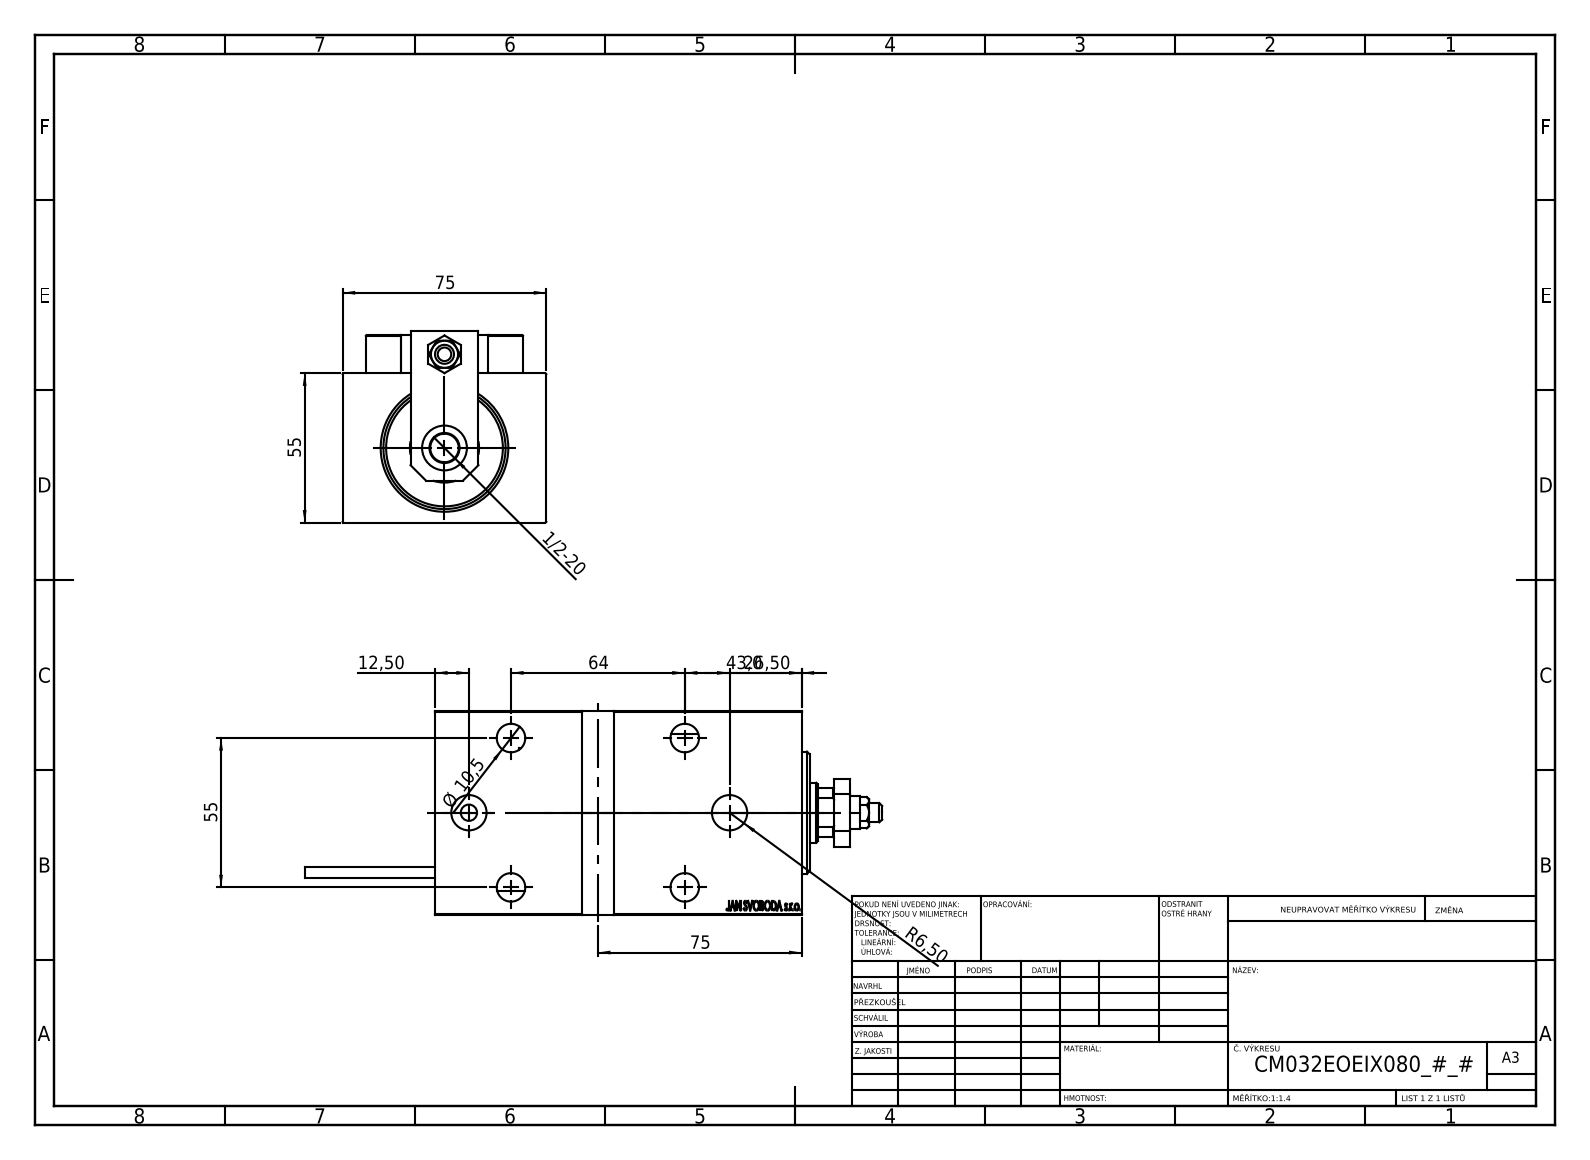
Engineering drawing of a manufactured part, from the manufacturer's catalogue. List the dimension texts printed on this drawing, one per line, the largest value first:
75
75
64
55
55
43,0
26,50
12,50
Ø 10,5
R6,50
1/2-20
